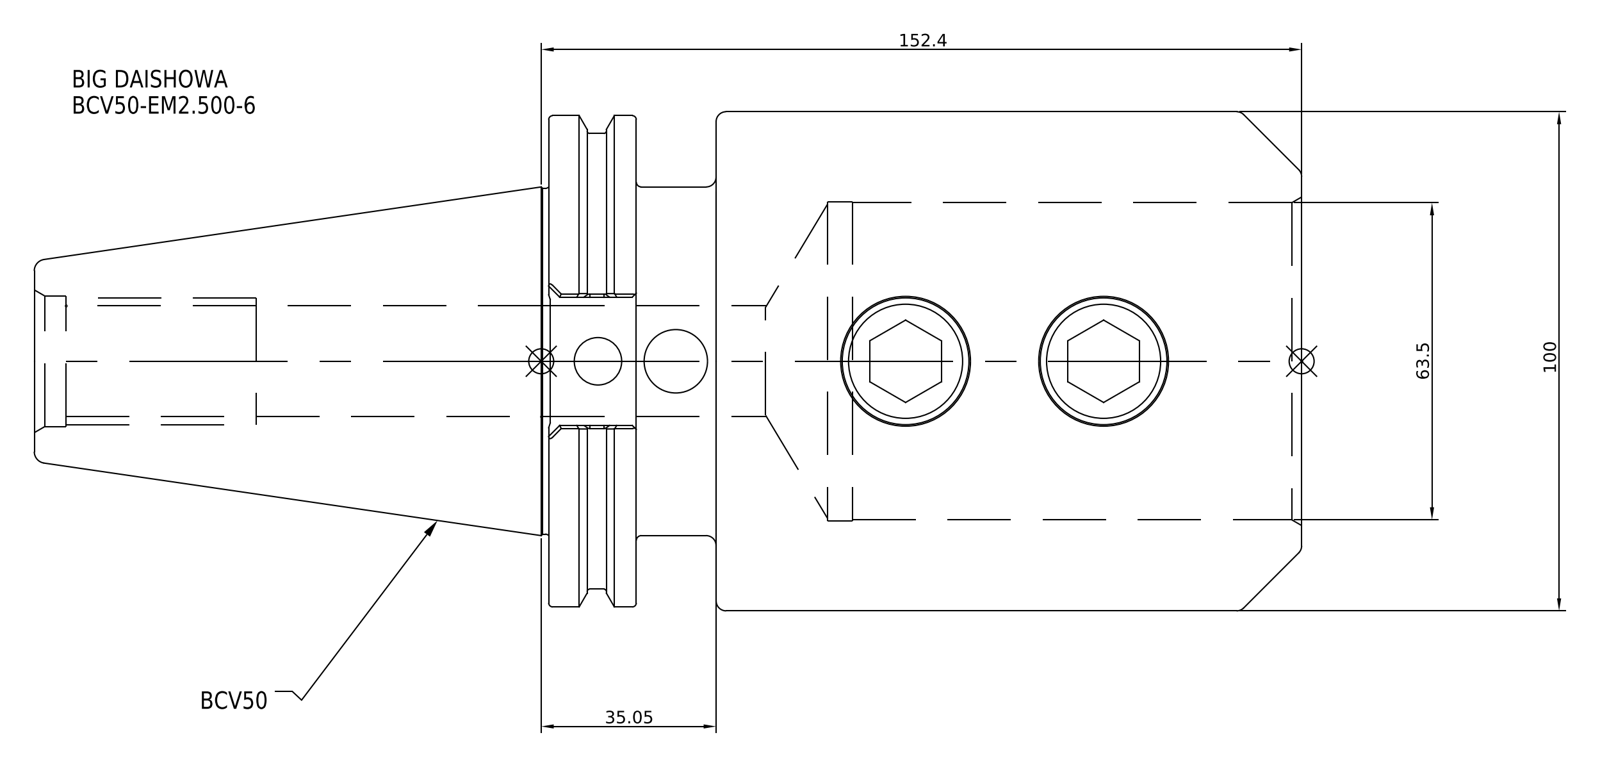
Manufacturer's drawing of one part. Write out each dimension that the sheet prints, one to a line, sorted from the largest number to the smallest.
152.4
100
63.5
35.05
